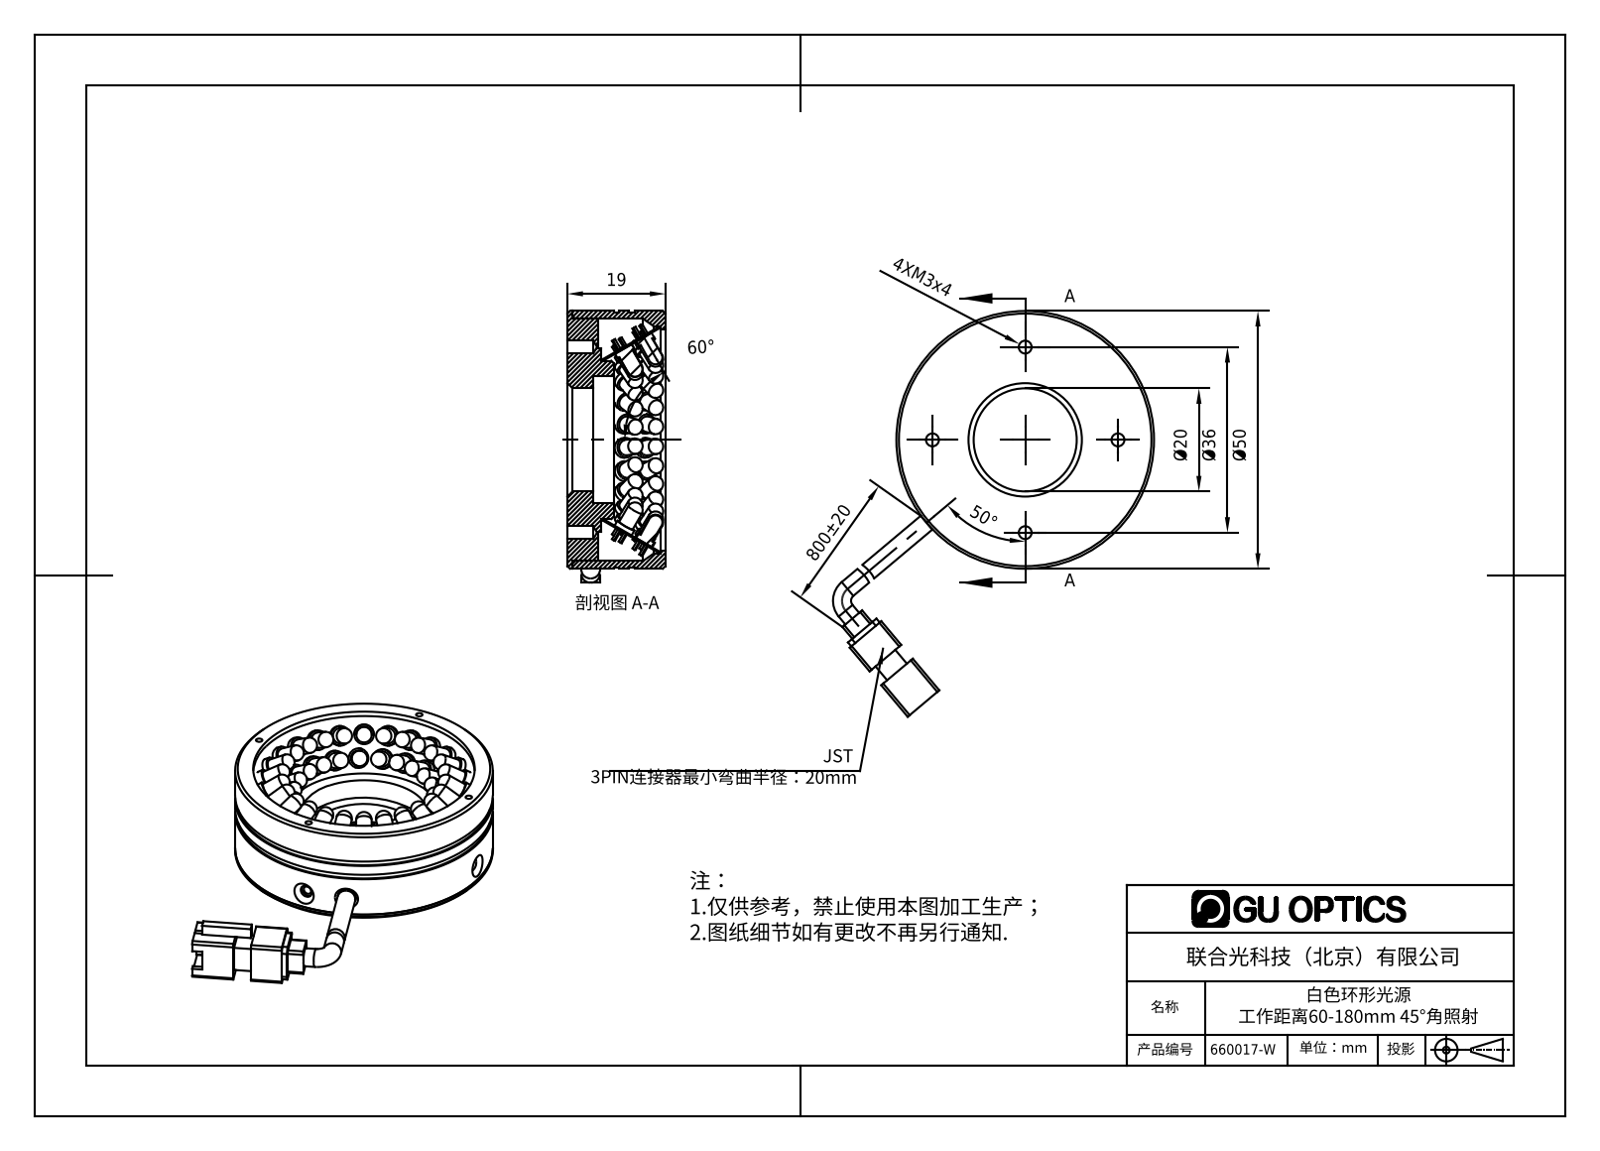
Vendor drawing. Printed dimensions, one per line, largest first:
800±20
60°
50°
Ø50
Ø36
Ø20
19
4XM3x4
